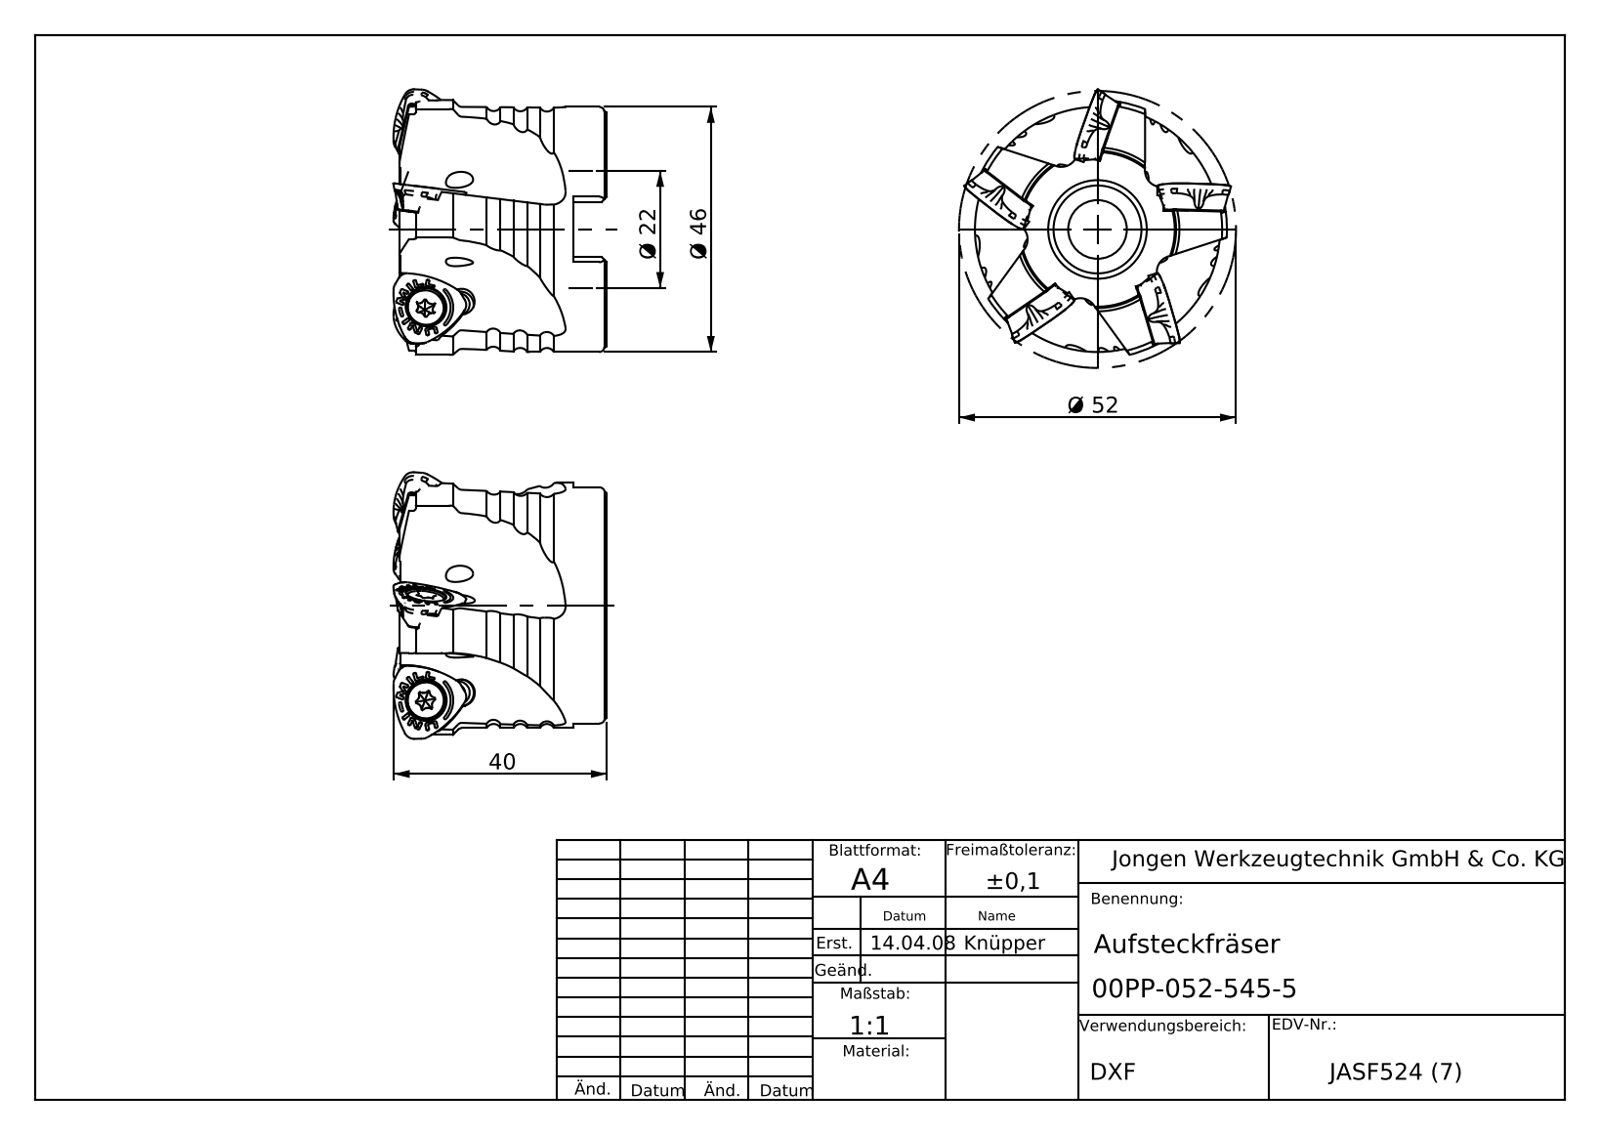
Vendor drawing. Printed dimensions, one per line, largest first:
Ø 52
Ø 46
40
Ø 22
